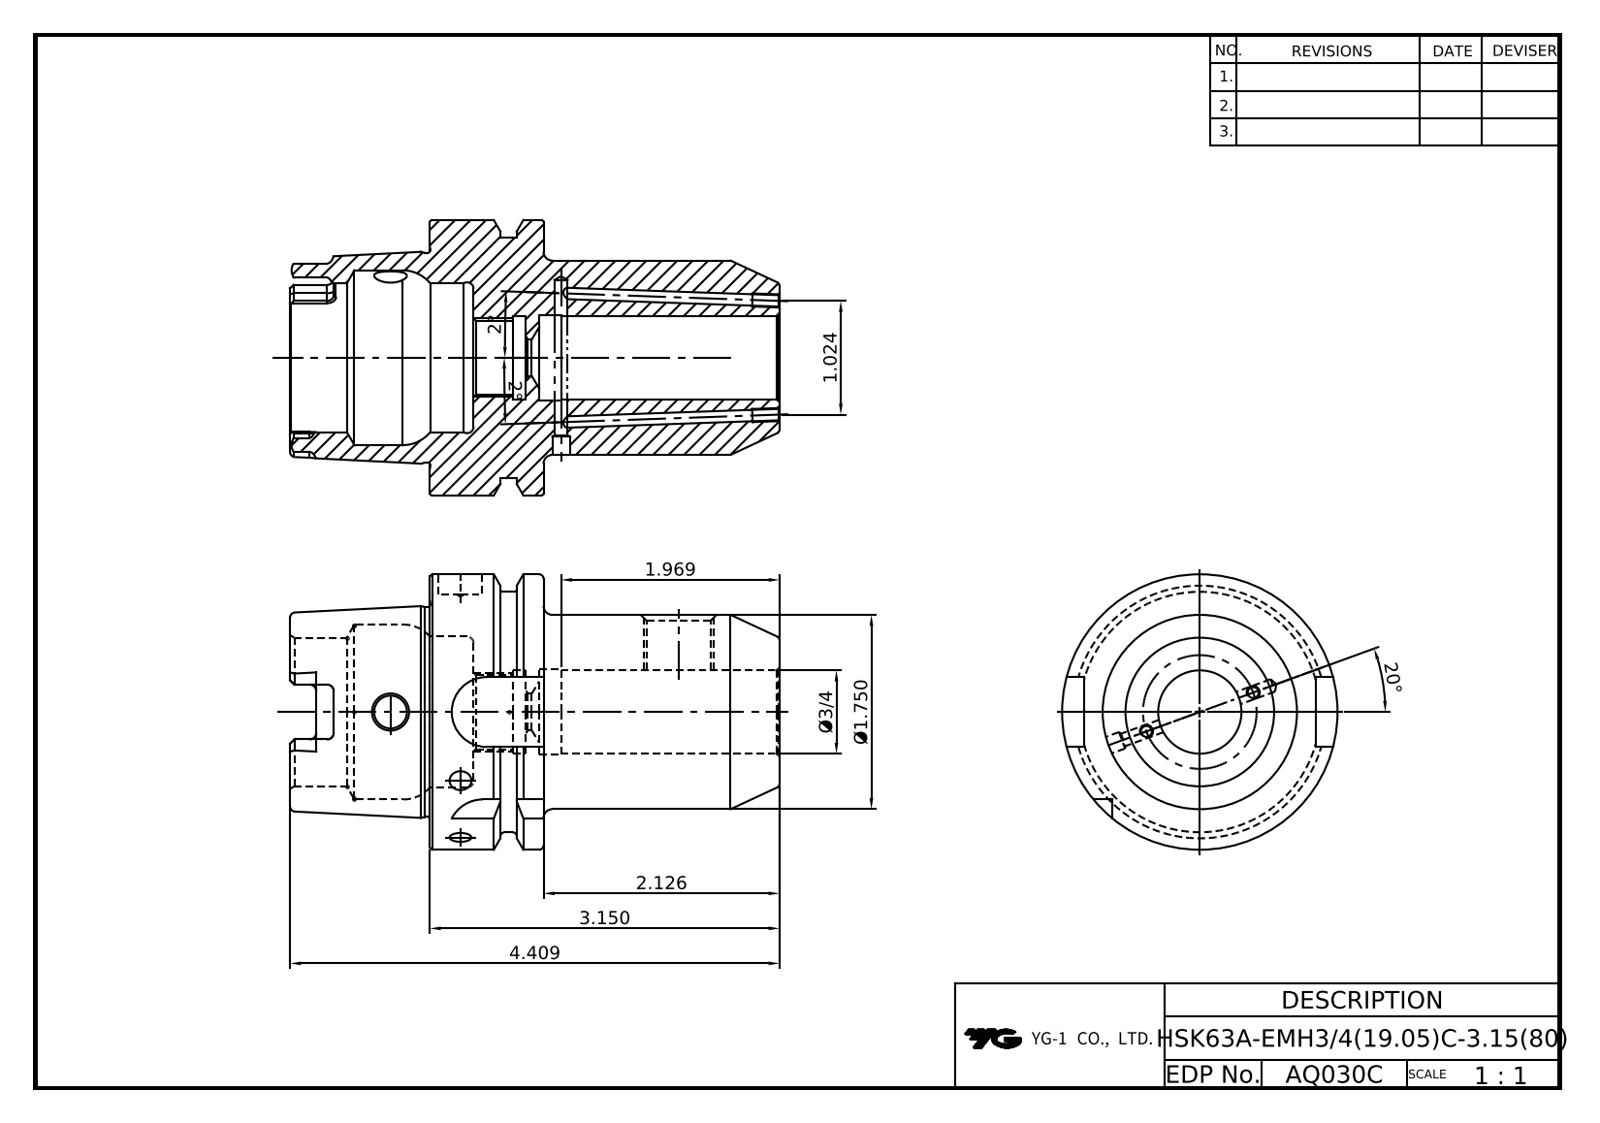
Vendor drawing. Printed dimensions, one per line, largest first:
20°
4.409
3.150
2.126
2°
2°
1.969
Ø1.750
1.024
Ø3/4
